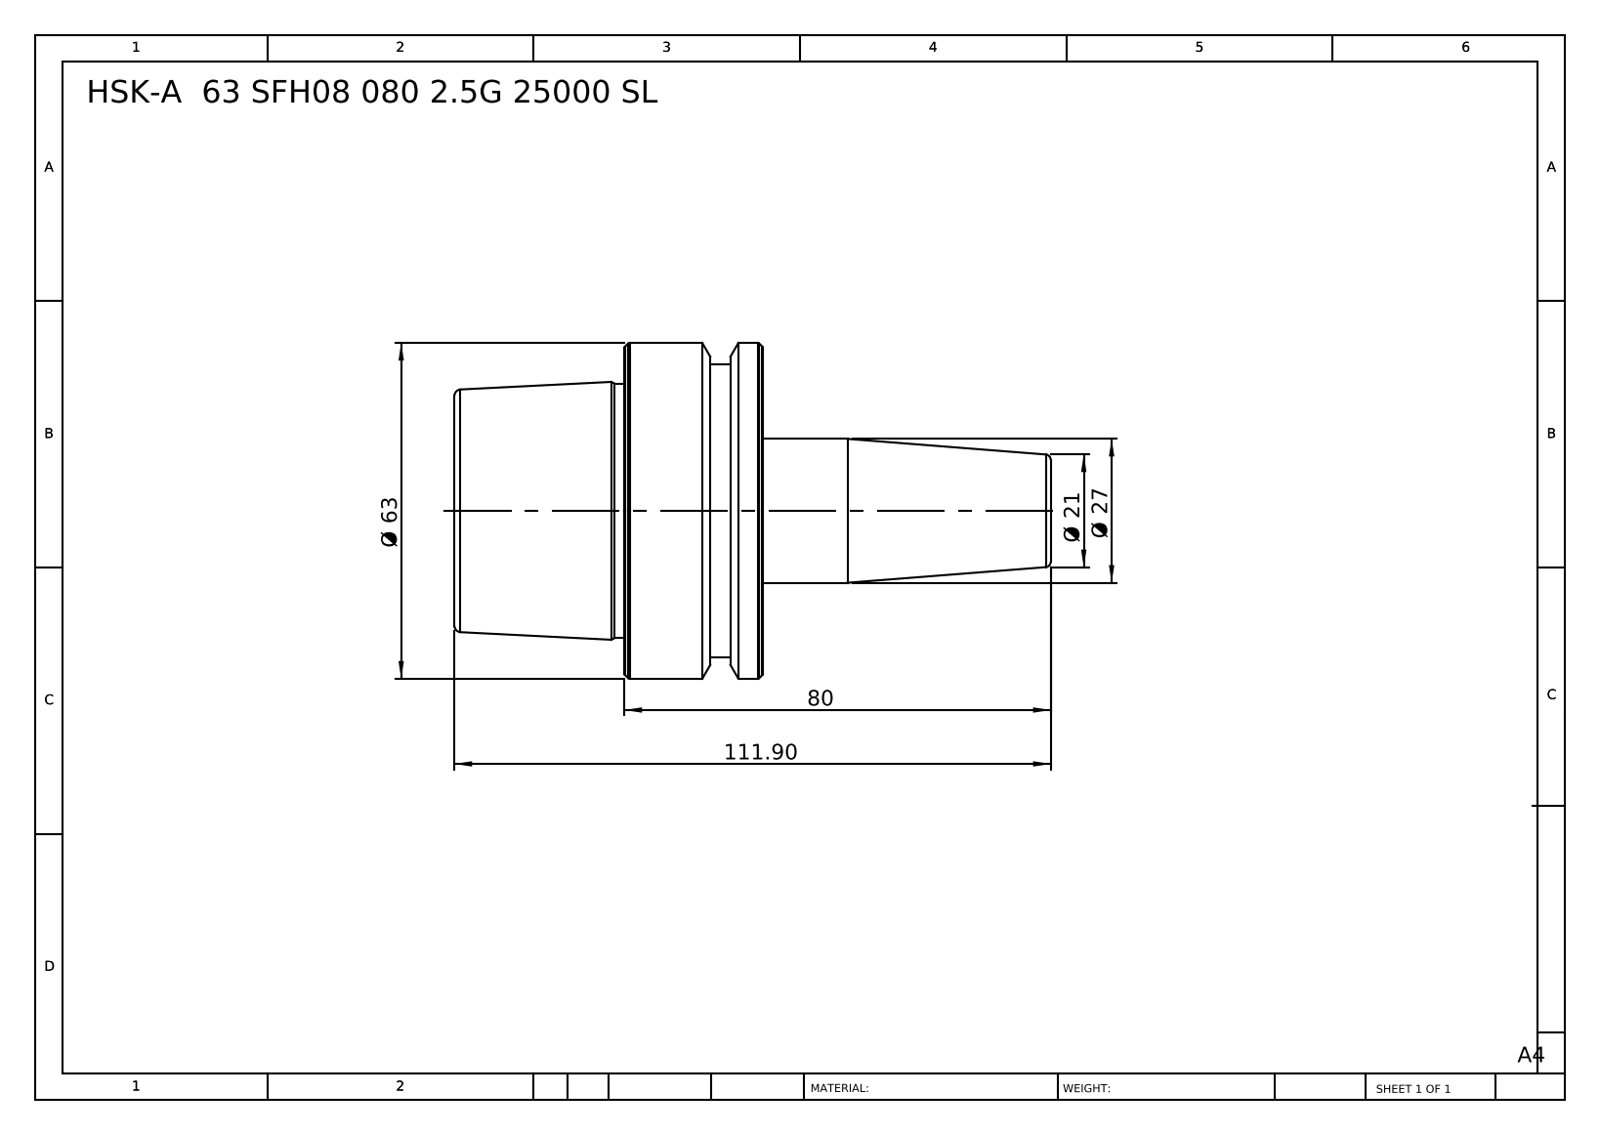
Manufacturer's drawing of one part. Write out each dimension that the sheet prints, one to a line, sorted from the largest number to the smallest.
111.90
80
Ø 63
Ø 27
Ø 21
